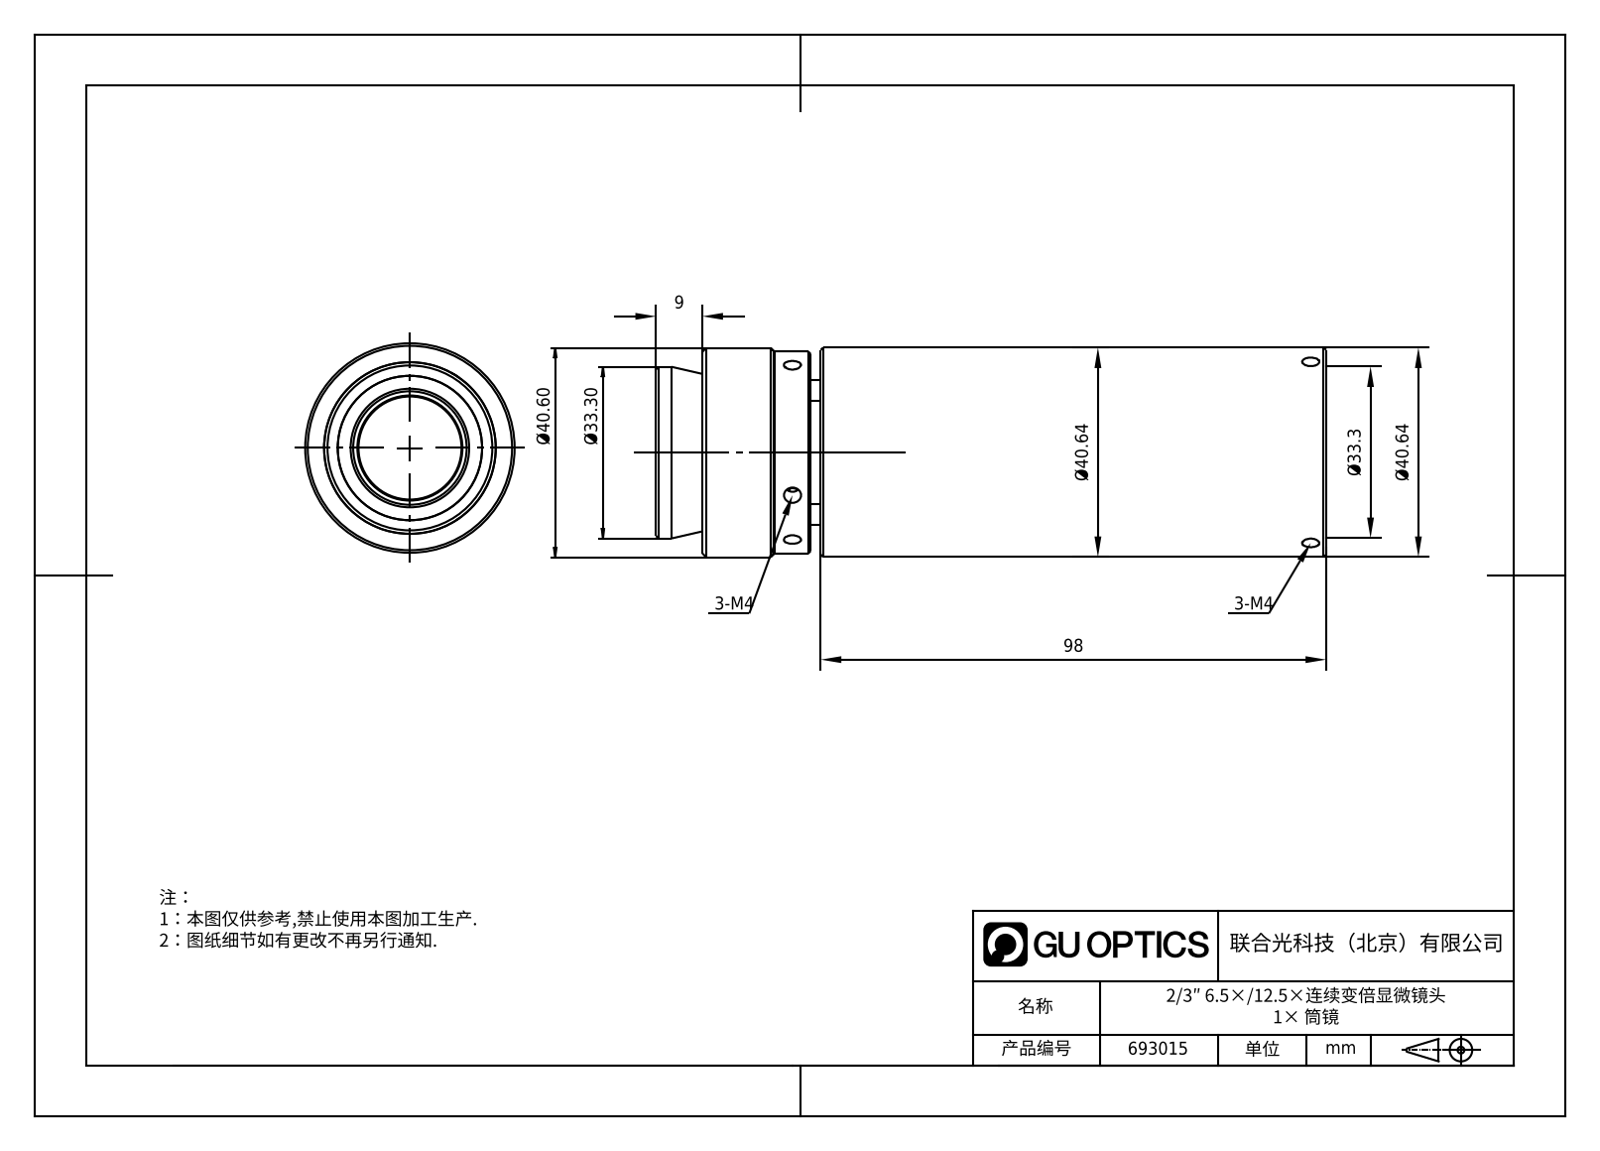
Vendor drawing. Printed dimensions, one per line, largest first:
98
Ø40.64
Ø40.64
Ø33.3
9
